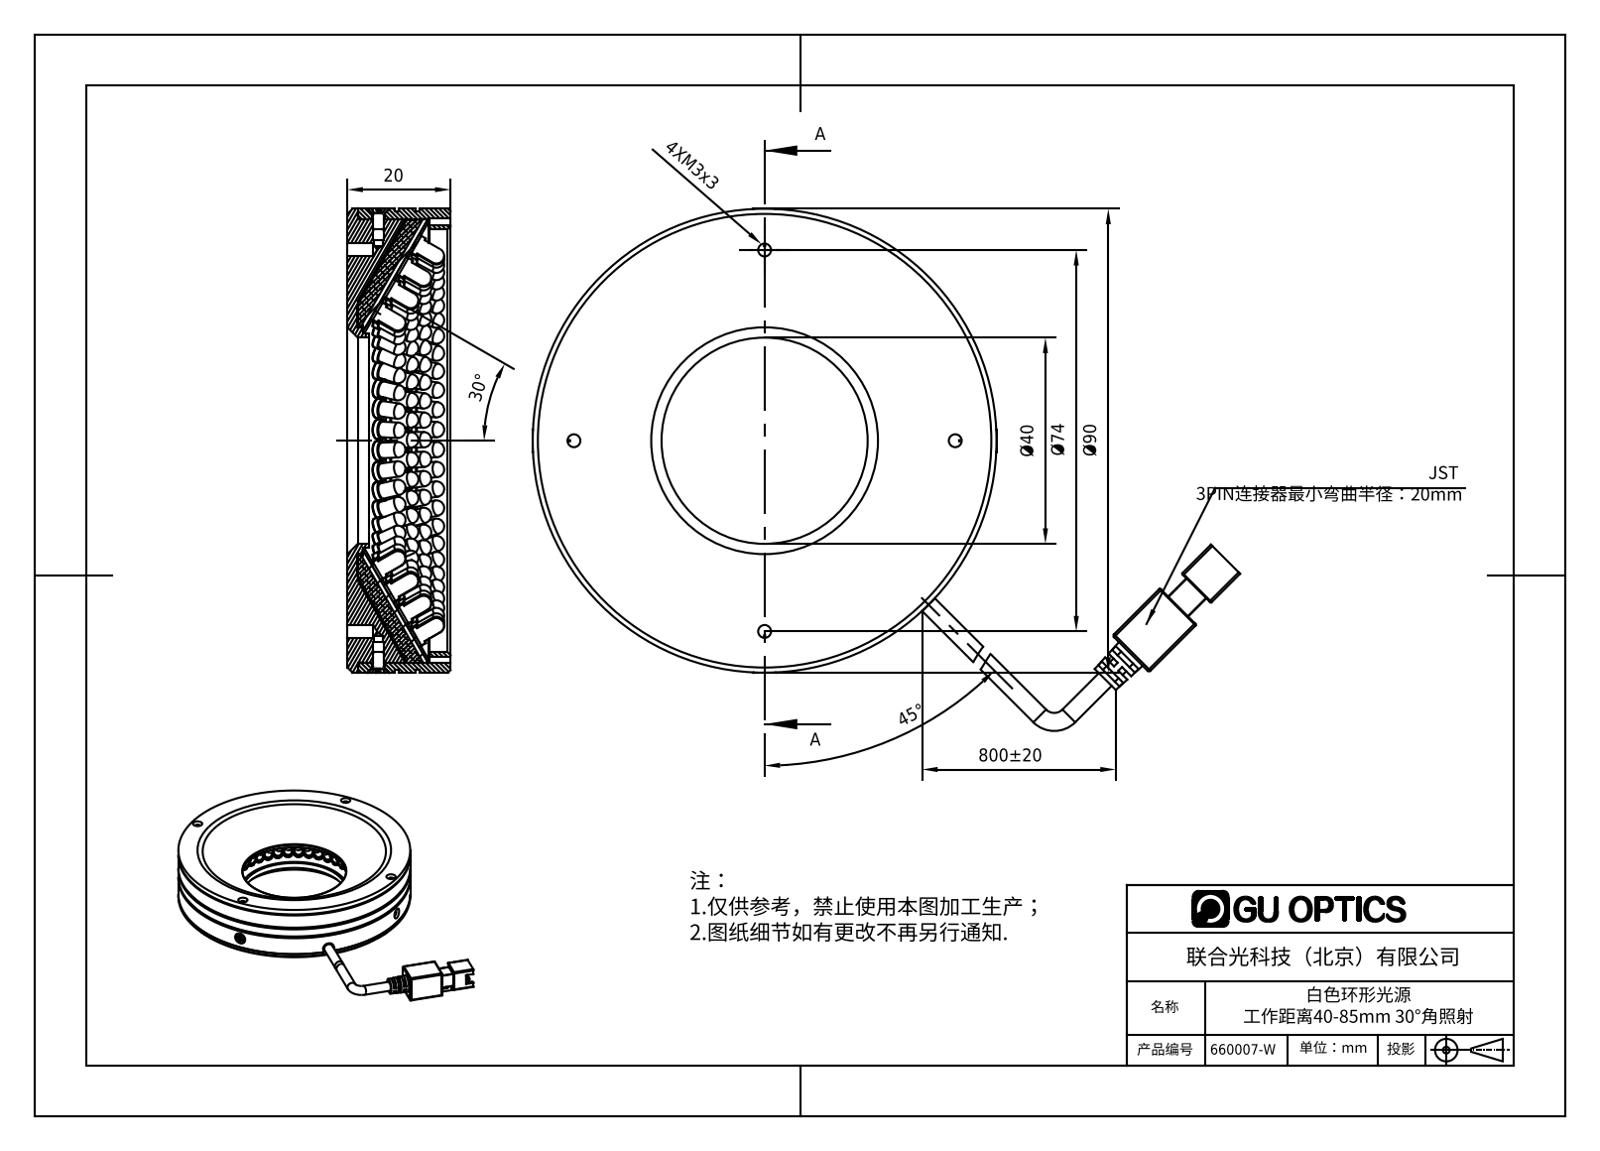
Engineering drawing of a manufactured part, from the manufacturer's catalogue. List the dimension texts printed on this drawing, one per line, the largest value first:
800±20
Ø90
Ø74
45°
Ø40
30°
20
4XM3x3
